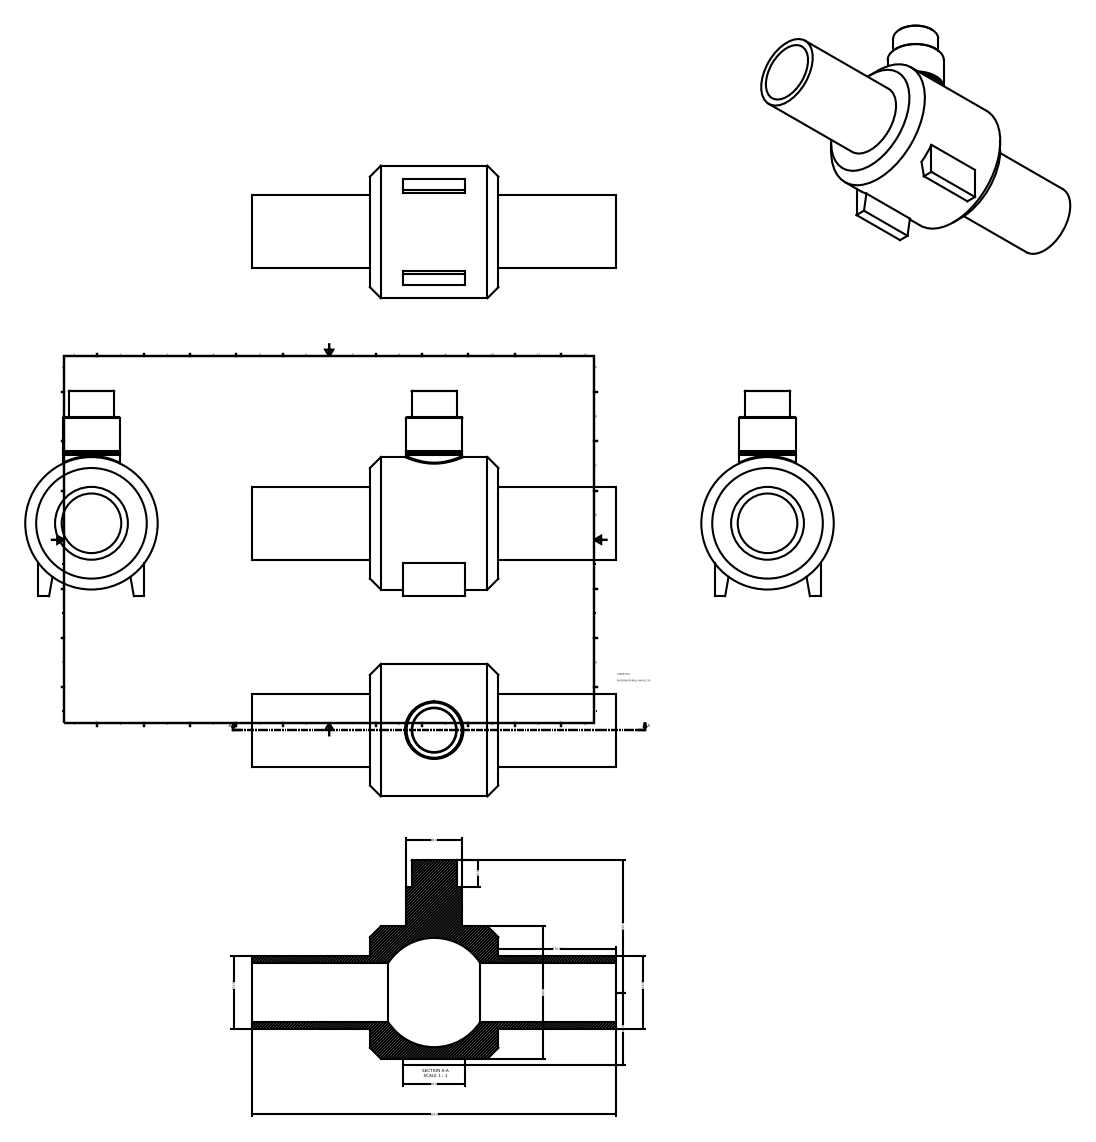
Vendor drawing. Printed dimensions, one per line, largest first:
550.00
200.00
200.00
178.00
110.00
110.00
110.00
93.00
85.00
40.00
